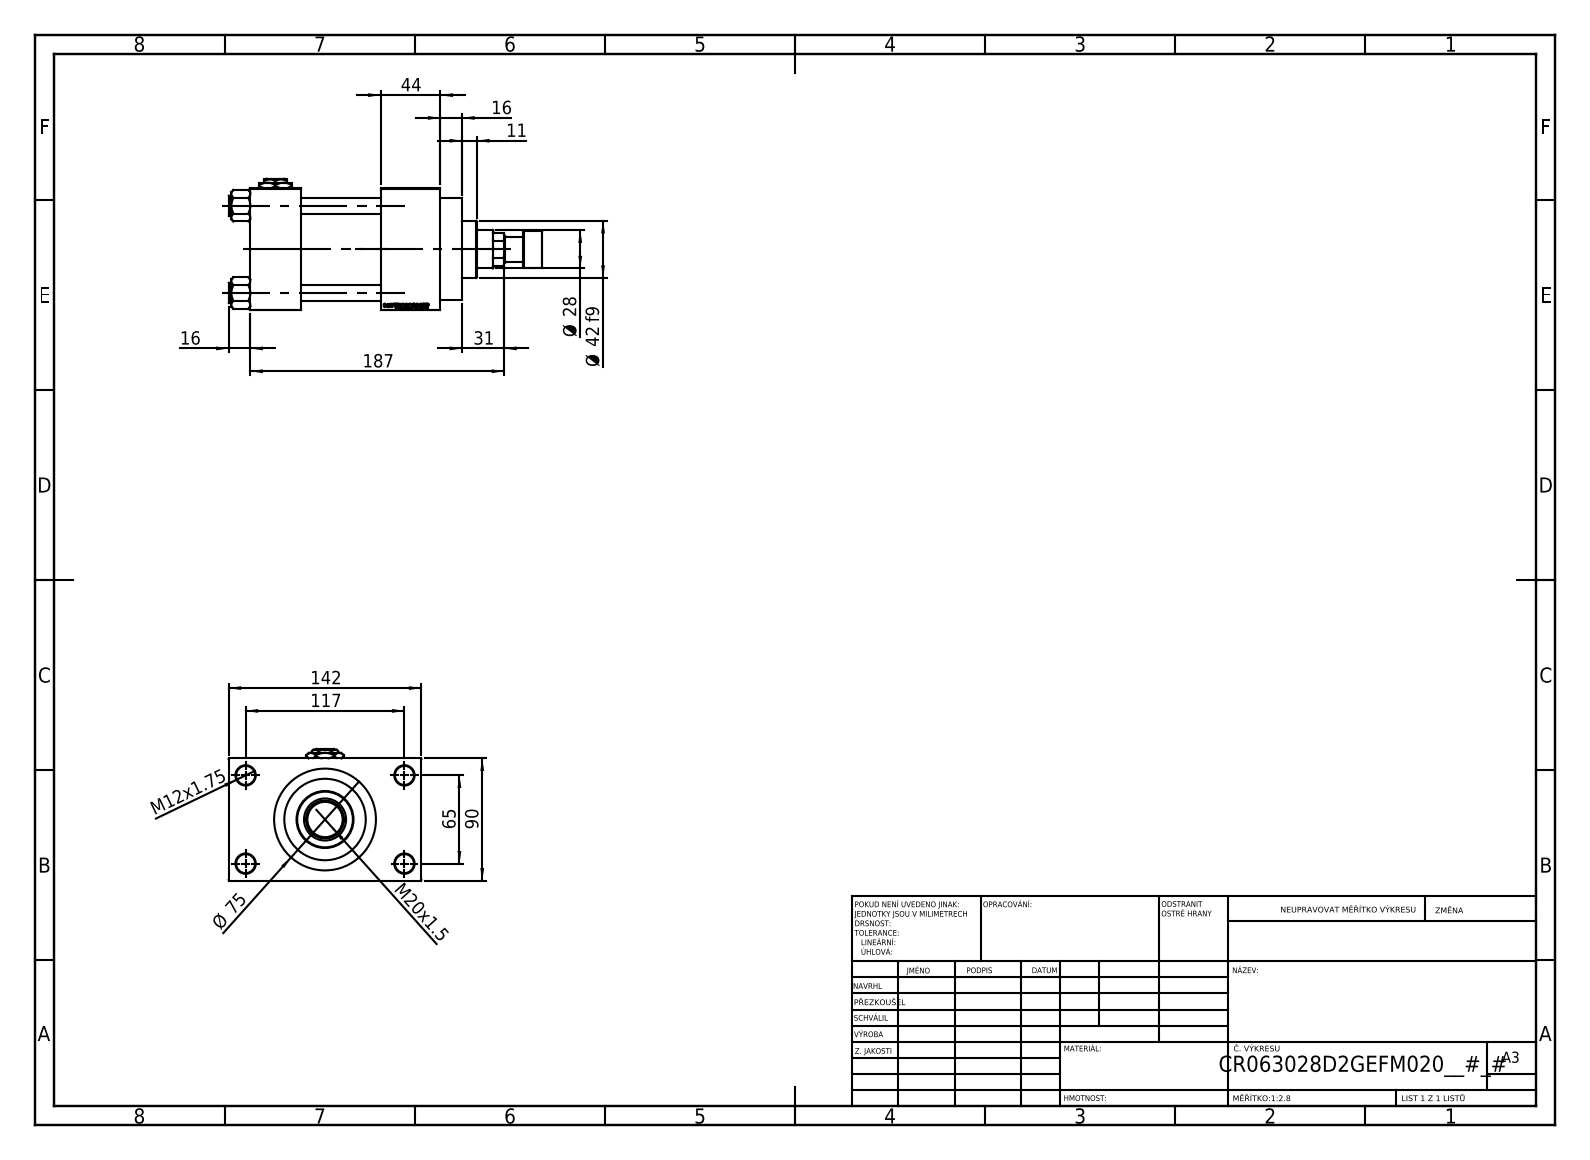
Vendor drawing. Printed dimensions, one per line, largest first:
187
142
117
90
Ø 75
65
44
Ø 42 f9
31
Ø 28
M20x1.5
16
16
M12x1.75
11
